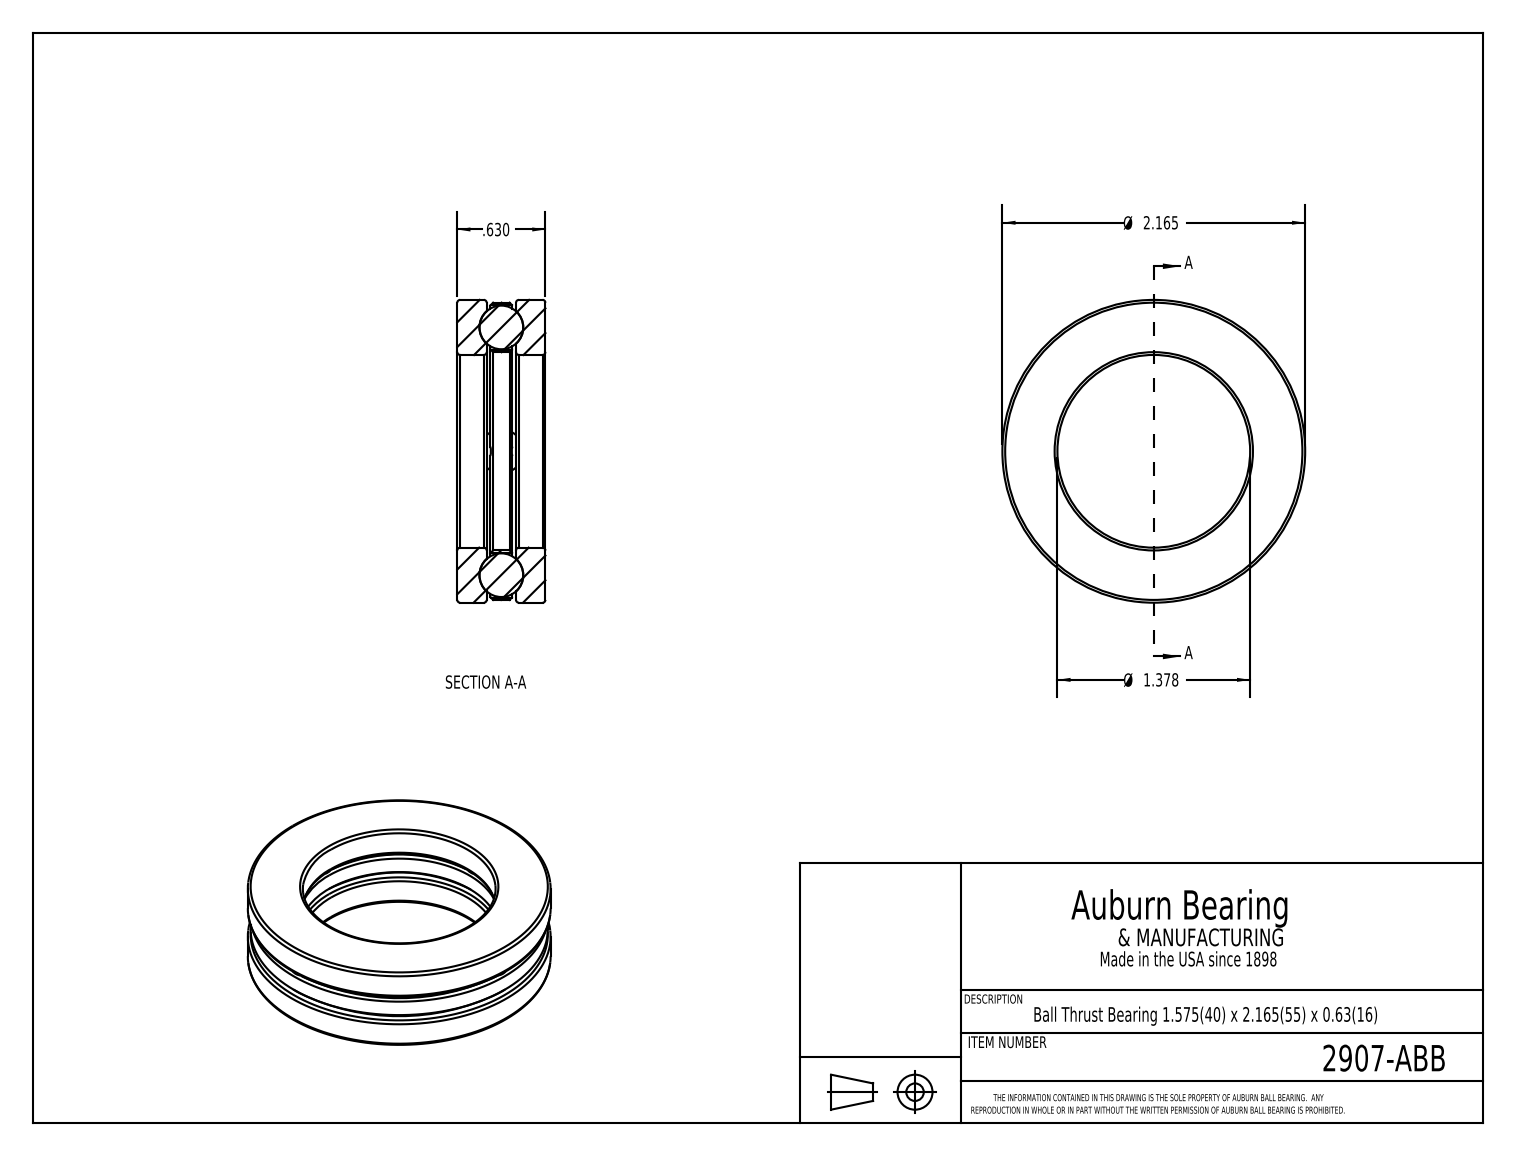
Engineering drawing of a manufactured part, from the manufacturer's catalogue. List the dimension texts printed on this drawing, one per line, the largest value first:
Ø 2.165
Ø 1.378
.630
